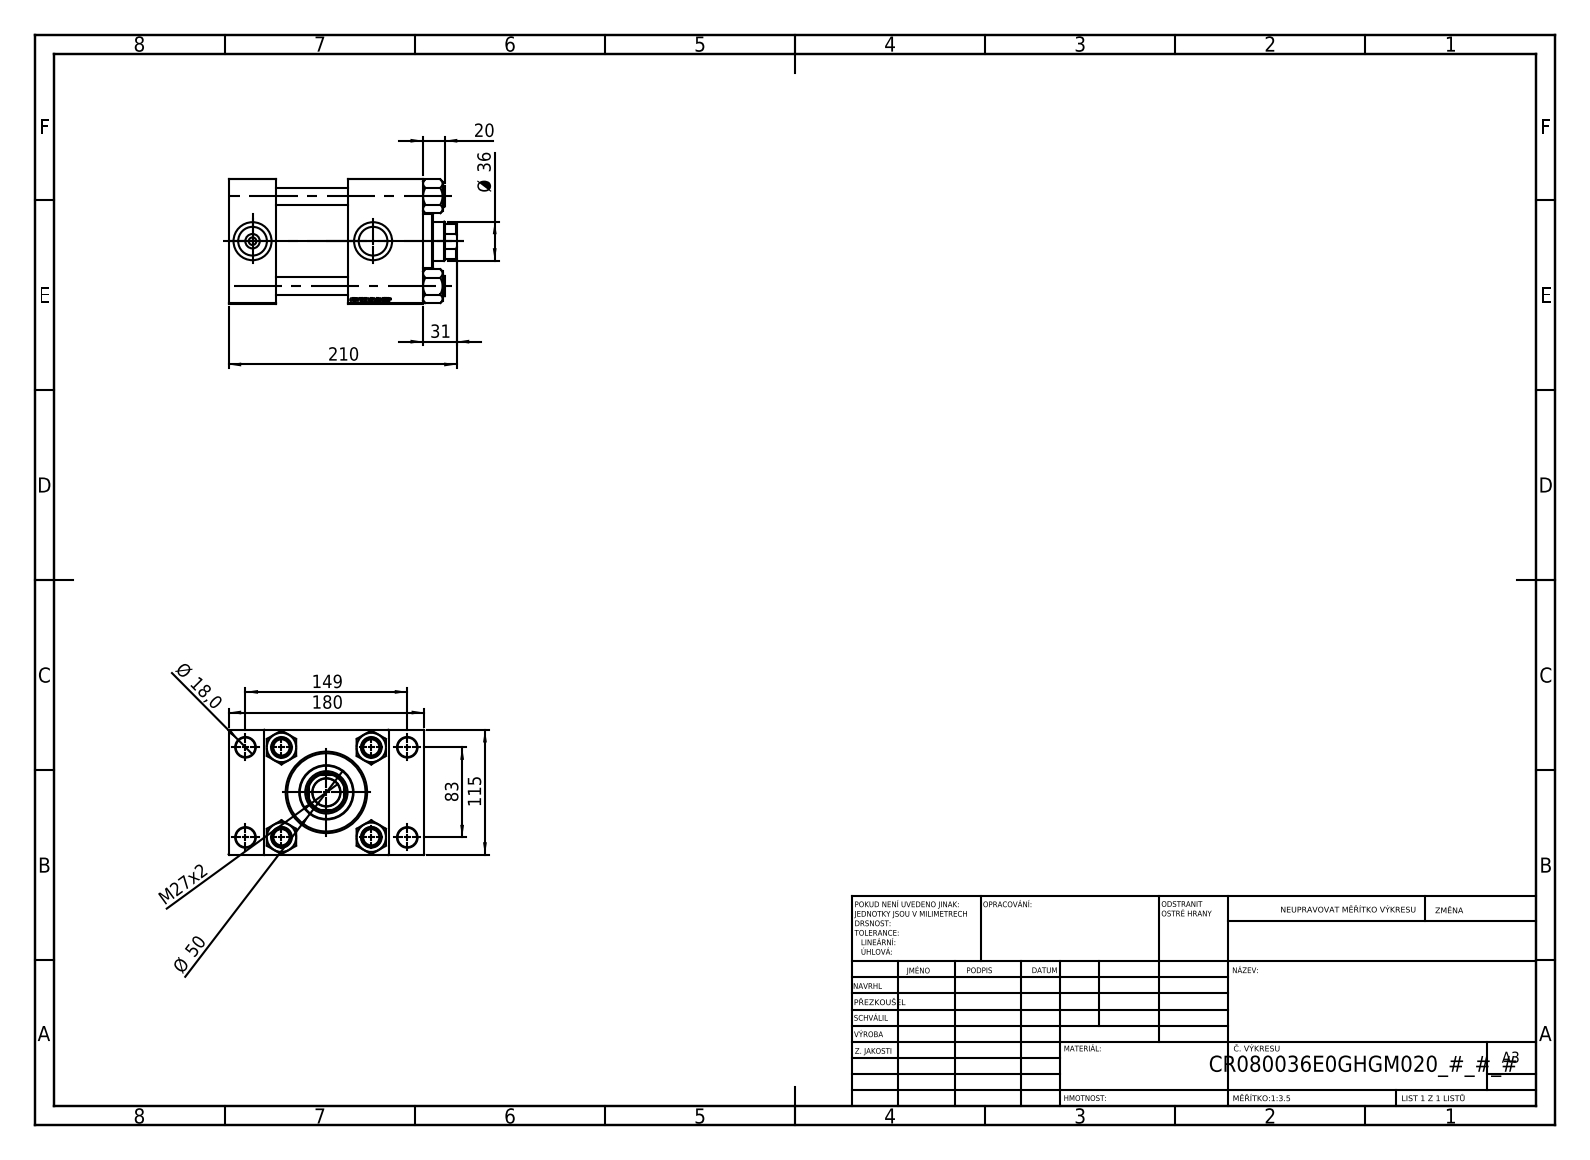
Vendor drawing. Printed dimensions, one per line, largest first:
210
180
149
115
83
Ø 50
Ø 36
31
M27x2
20
Ø 18,0
